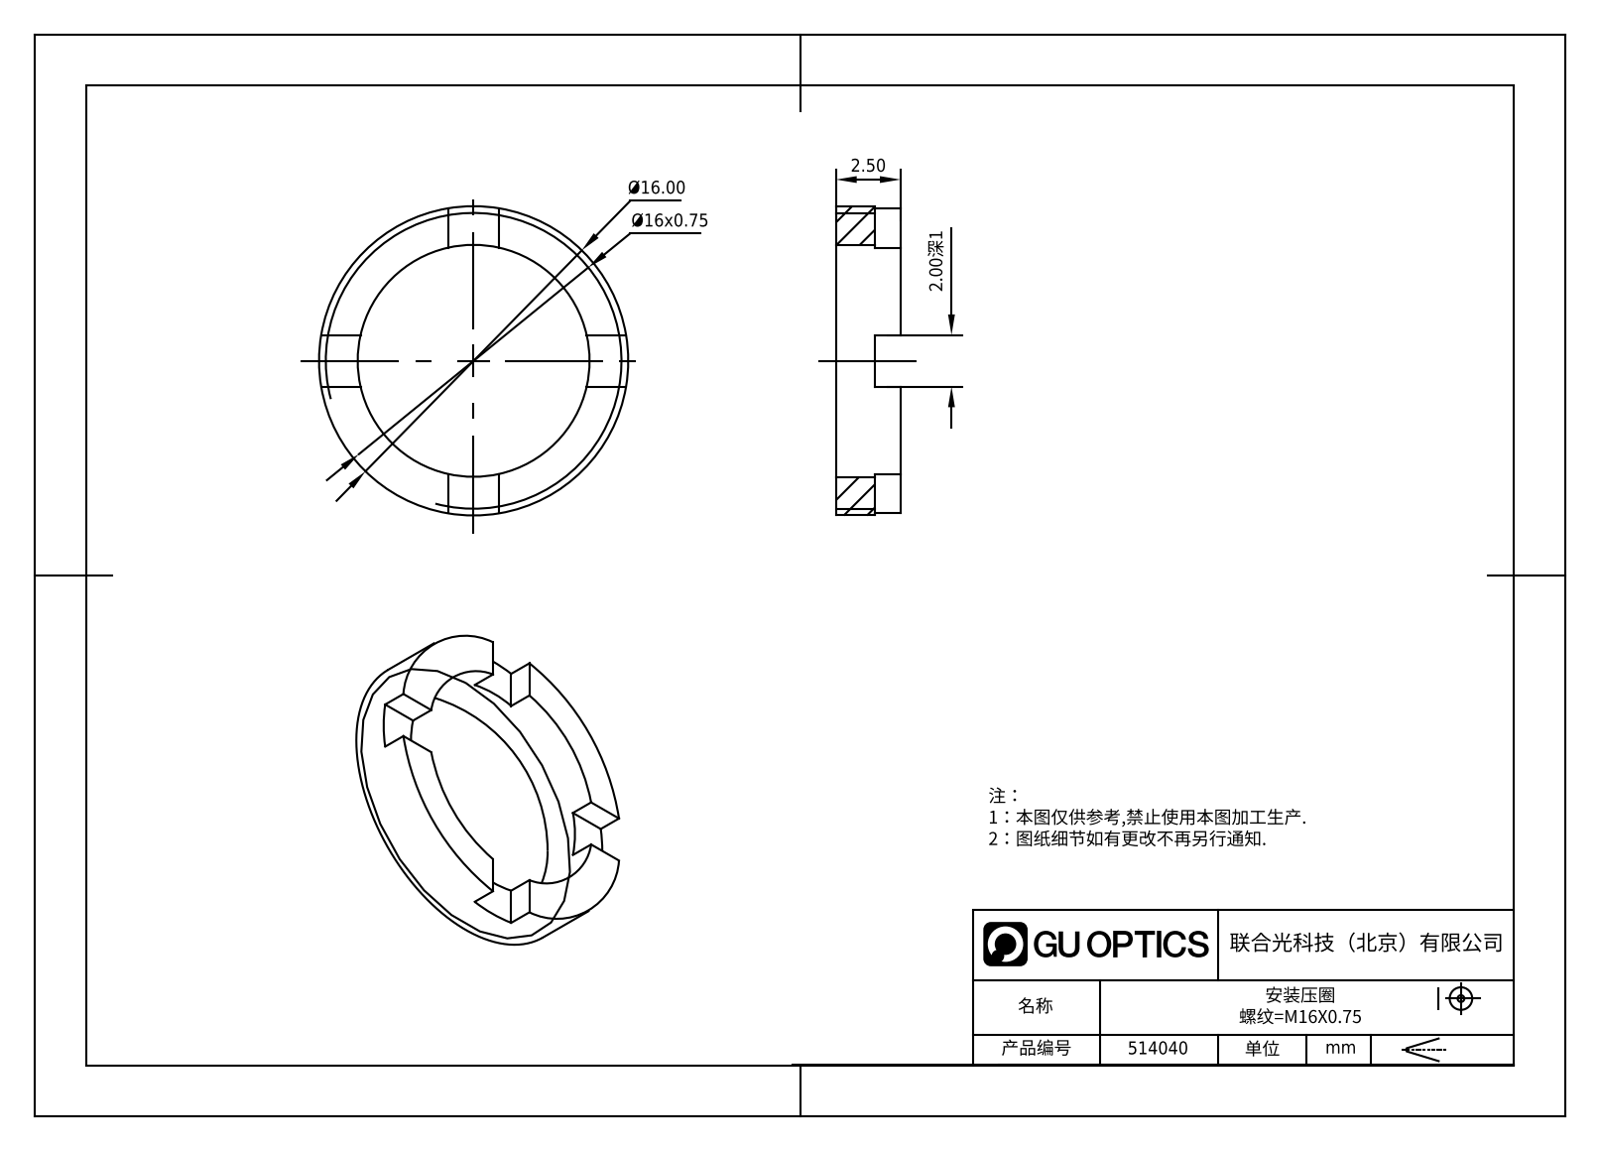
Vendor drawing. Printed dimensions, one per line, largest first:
Ø16.00
Ø16x0.75
2.50
2.00深1
